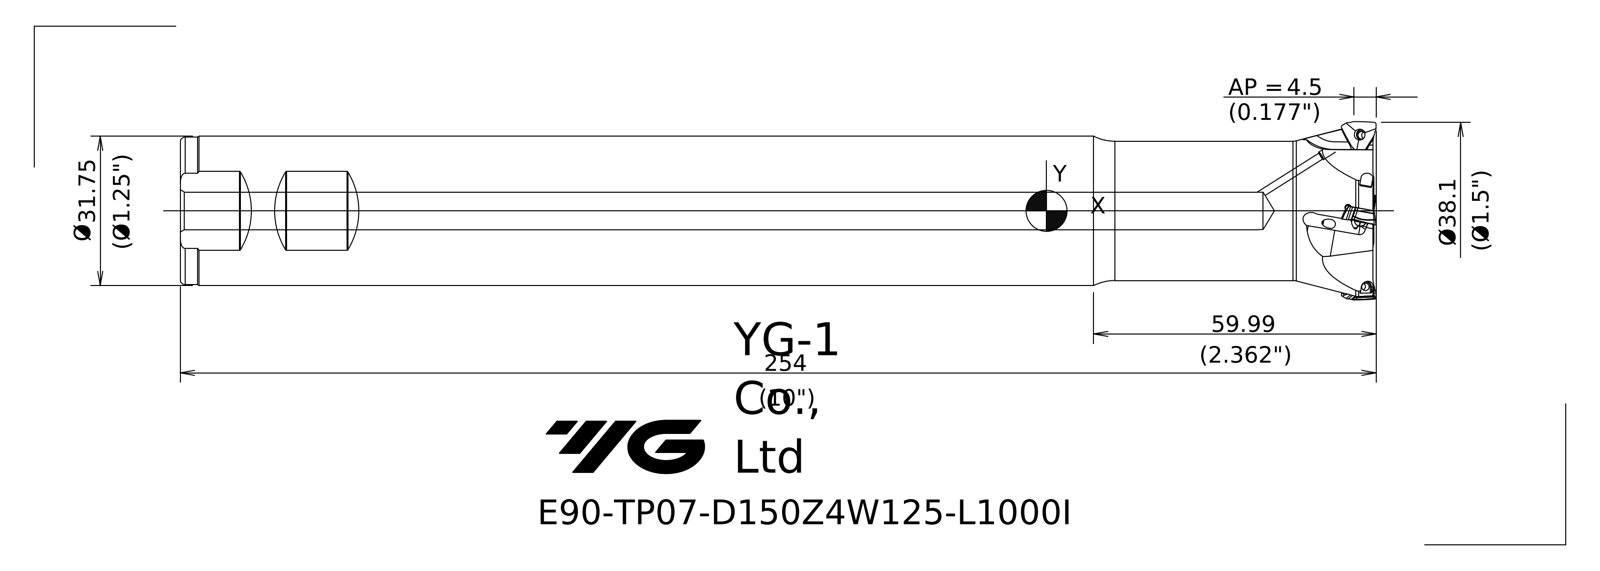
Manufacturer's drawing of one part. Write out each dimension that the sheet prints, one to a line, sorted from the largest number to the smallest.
254
59.99
Ø38.1
4.5 AP =
